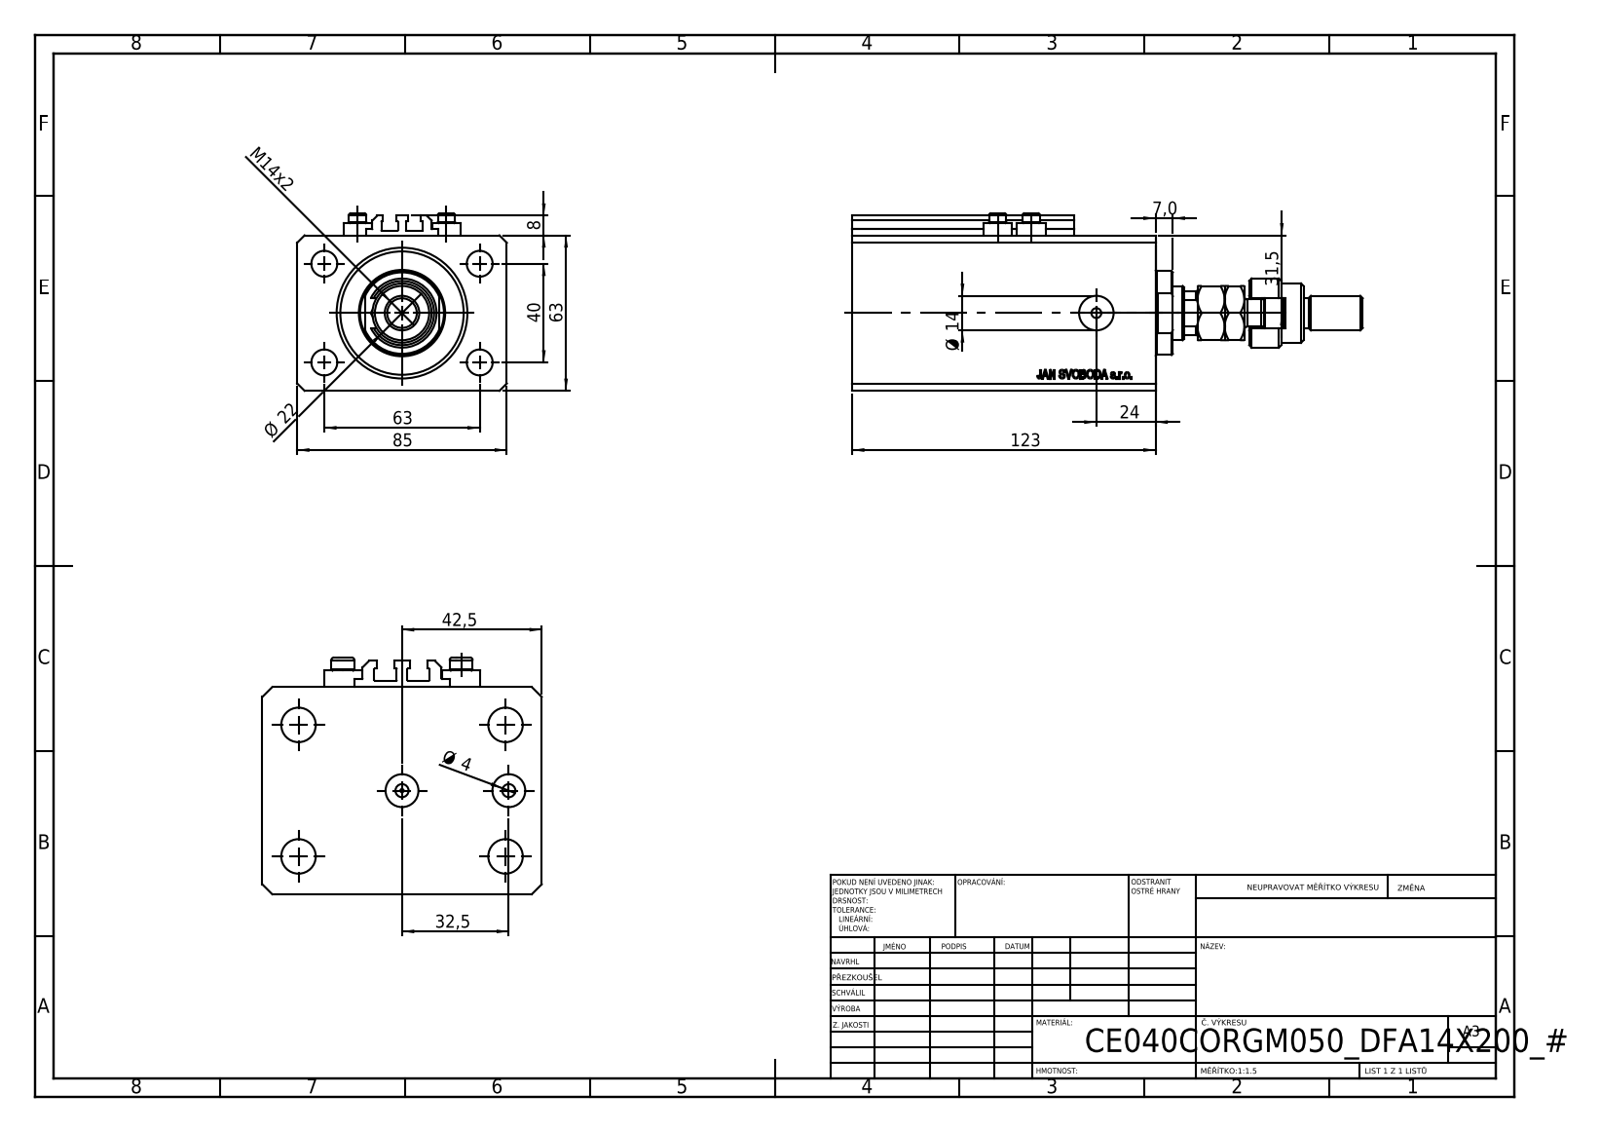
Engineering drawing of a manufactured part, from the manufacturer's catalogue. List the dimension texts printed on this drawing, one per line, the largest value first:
123
85
63
63
42,5
40
32,5
31,5
24
Ø 22
M14x2
Ø 14
8
7,0
Ø 4
